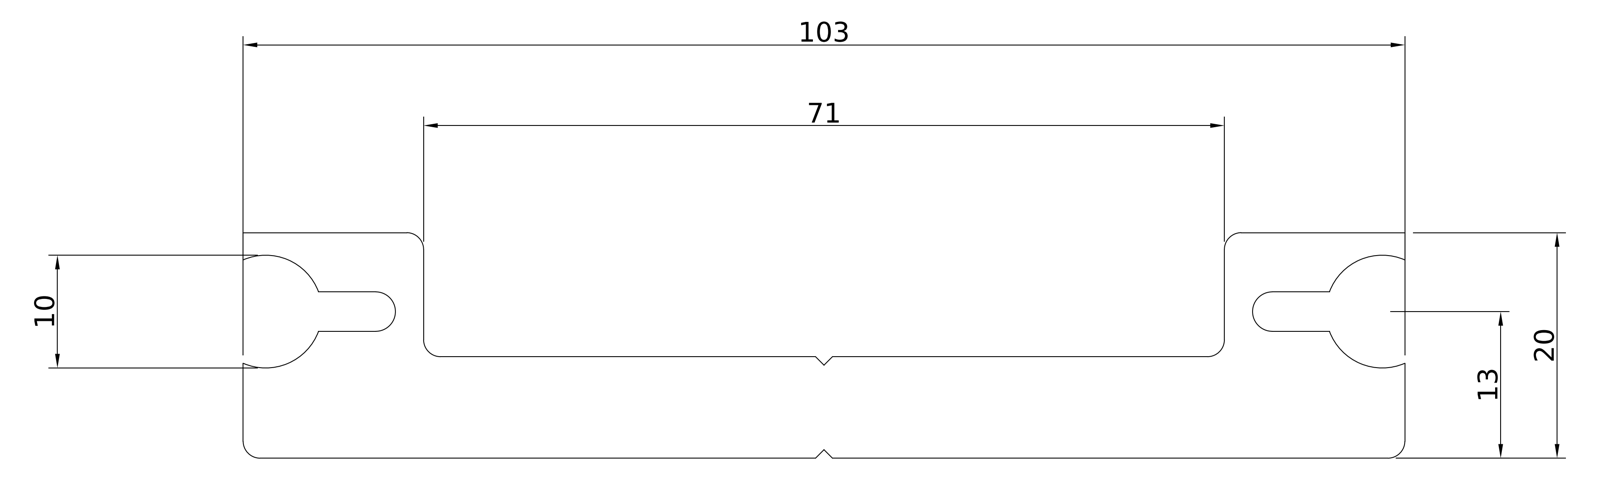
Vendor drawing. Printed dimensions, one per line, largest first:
103
71
20
13
10
